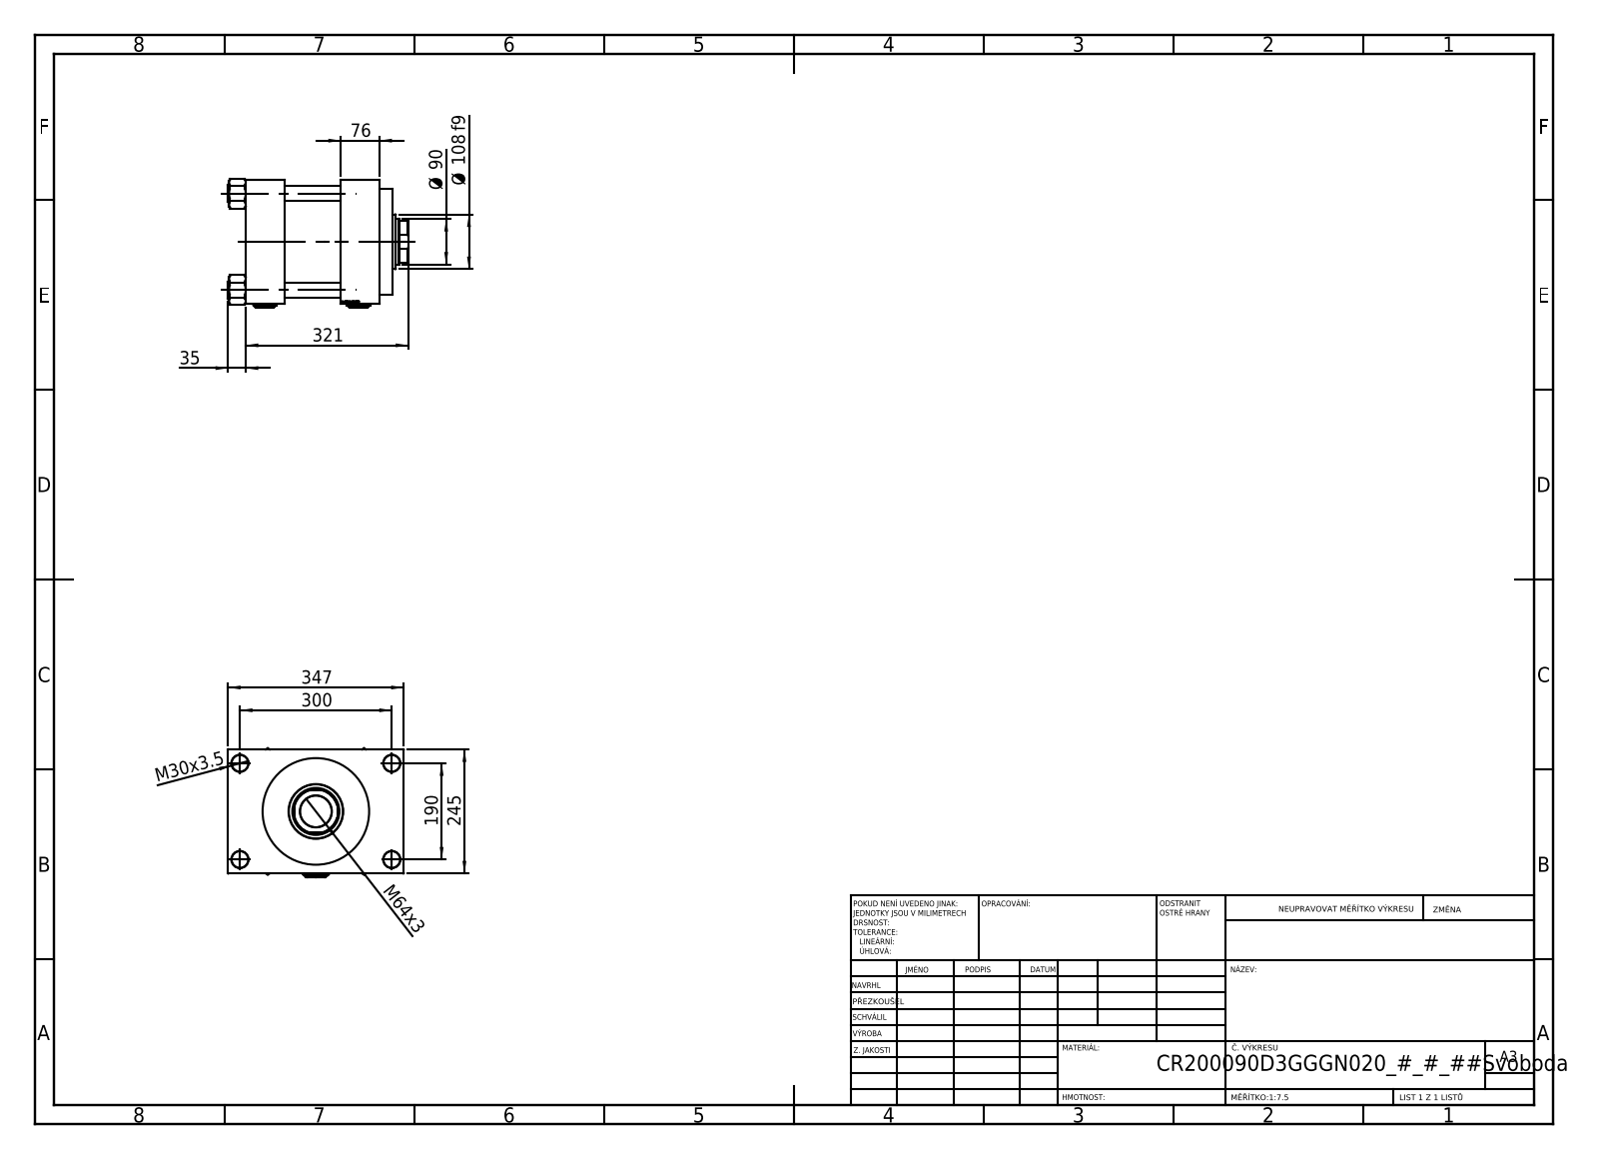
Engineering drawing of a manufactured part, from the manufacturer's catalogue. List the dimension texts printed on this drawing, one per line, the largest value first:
347
321
300
245
190
Ø 108 f9
Ø 90
76
M64x3
35
M30x3.5
